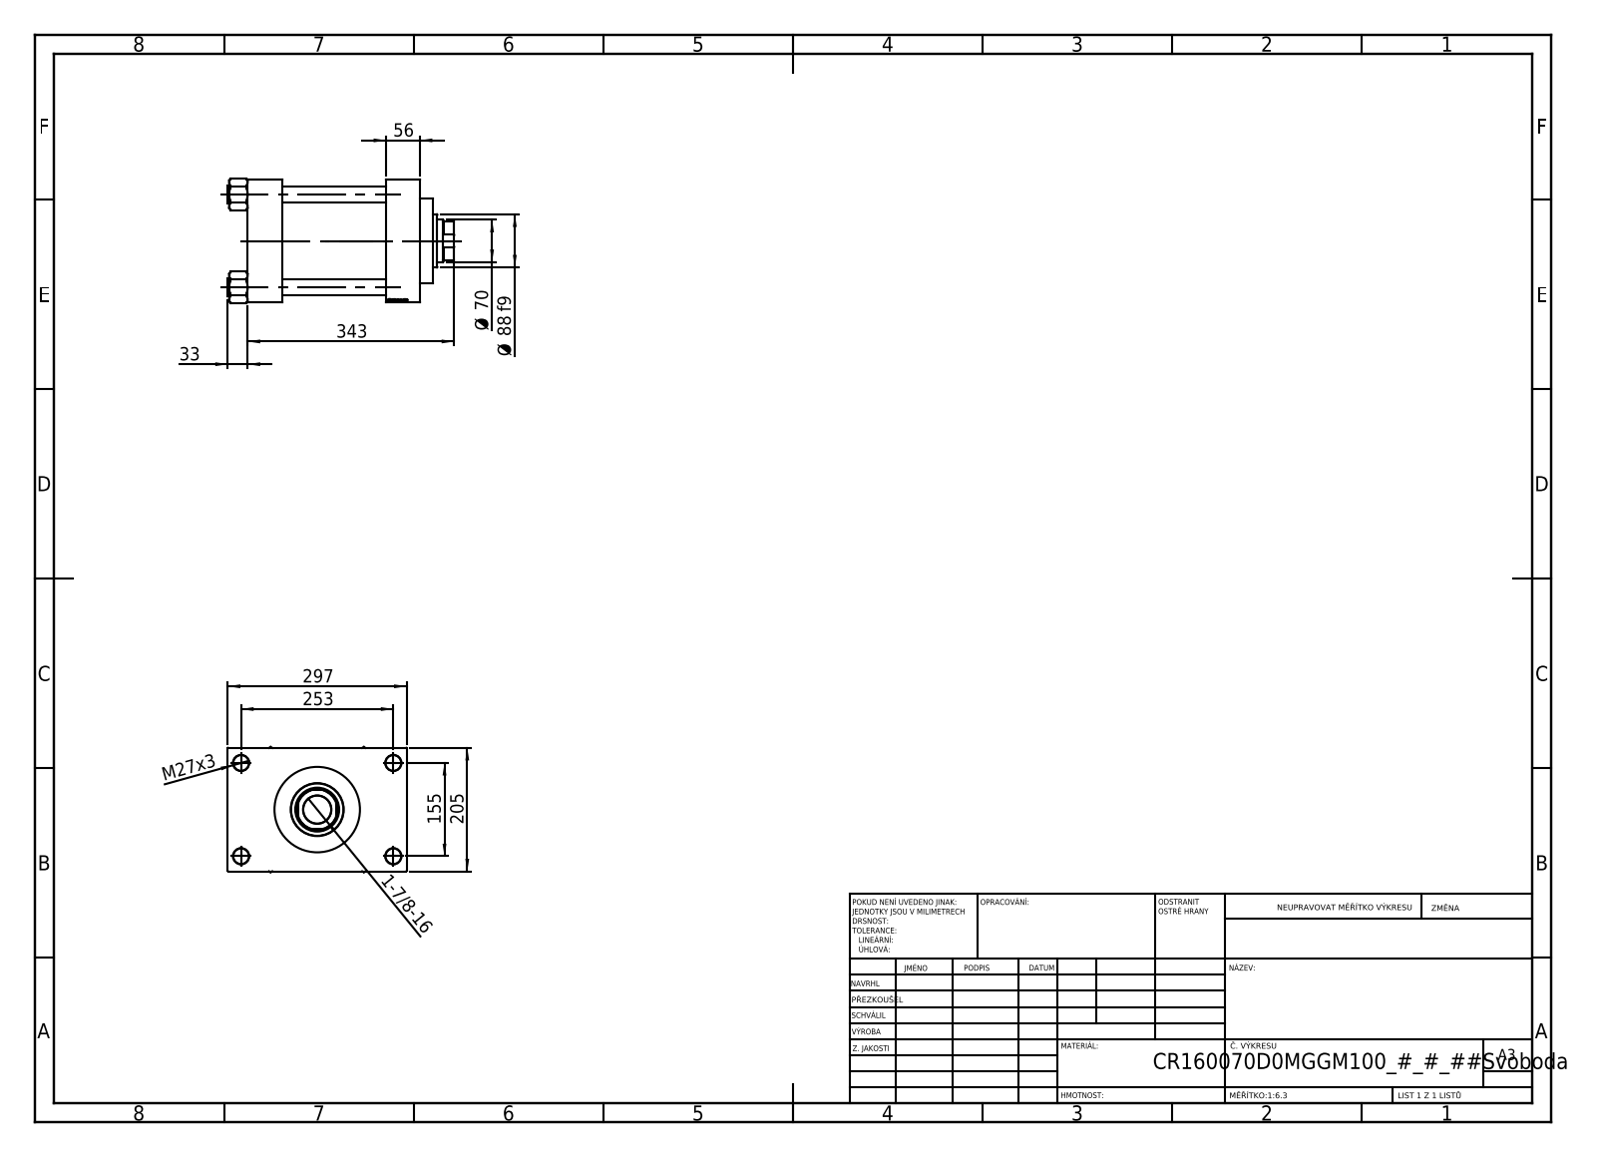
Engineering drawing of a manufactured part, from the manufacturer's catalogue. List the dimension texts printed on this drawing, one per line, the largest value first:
343
297
253
205
155
Ø 88 f9
Ø 70
56
33
M27x3
1-7/8-16
